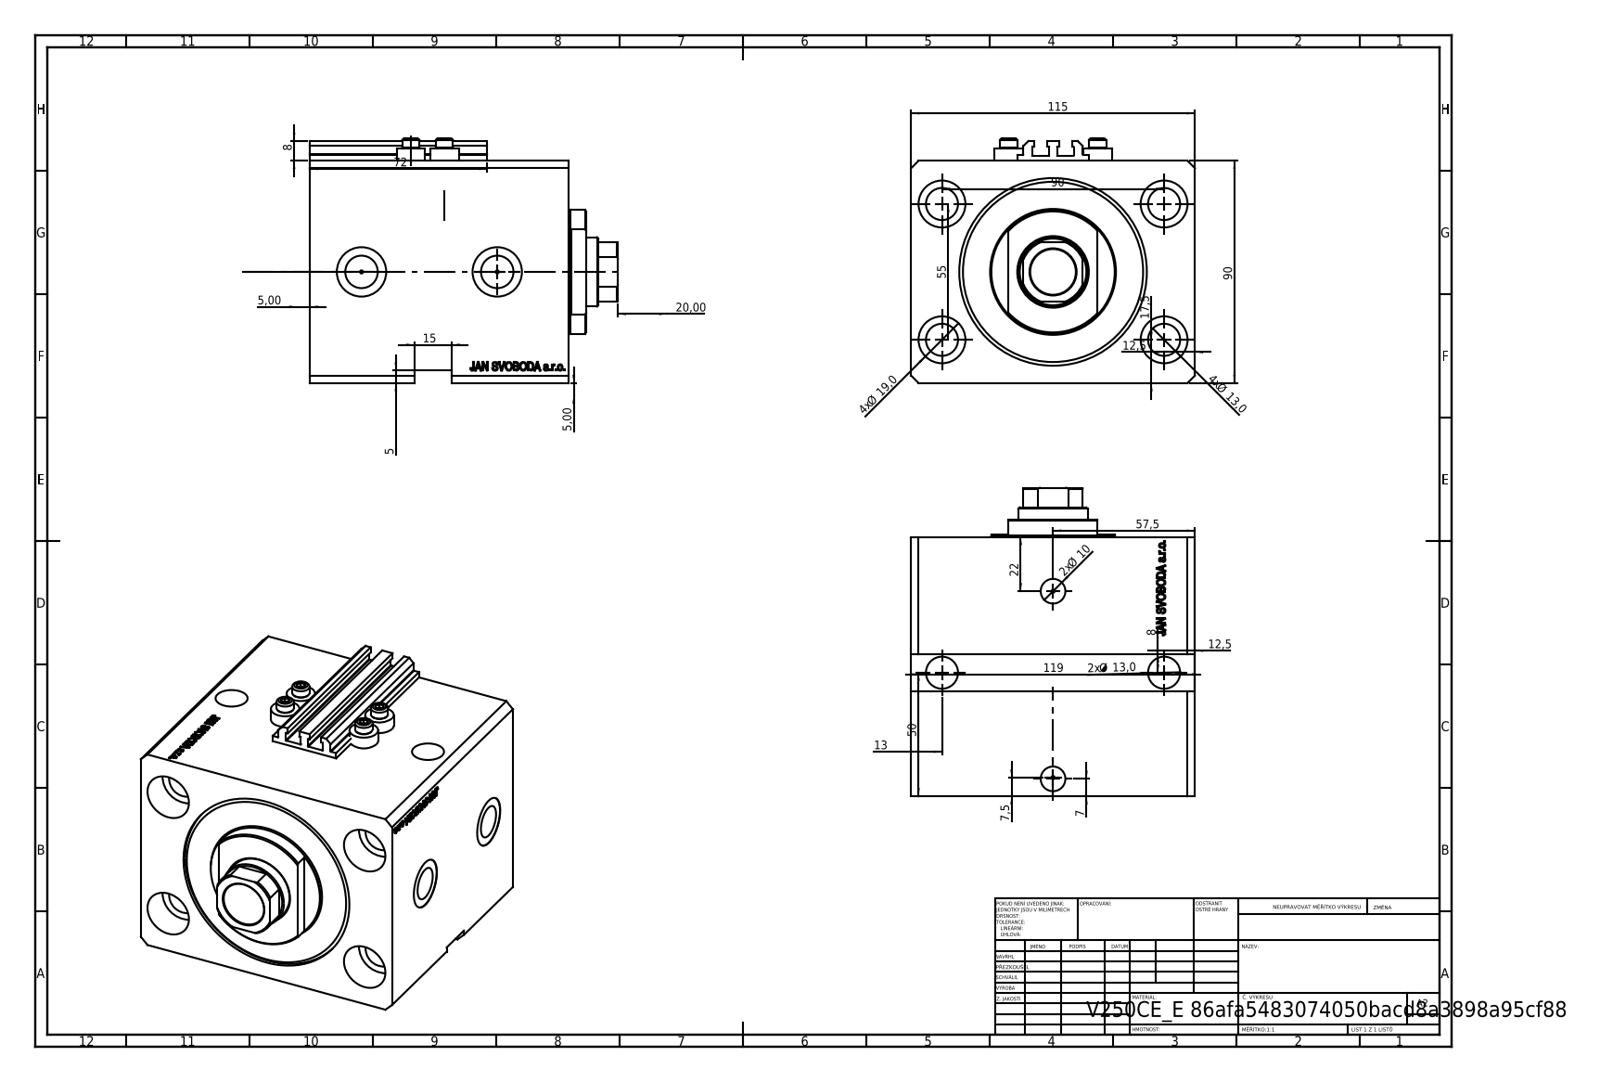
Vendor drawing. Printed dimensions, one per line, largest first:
119
115
90
90
72
57,5
55
50
22
20,00
4x Ø 19,0
17,5
15
4x Ø 13,0
2x Ø 13,0
13
12,5
12,5
2x Ø 10
8
8
7,5
7
5,00
5,00
5
